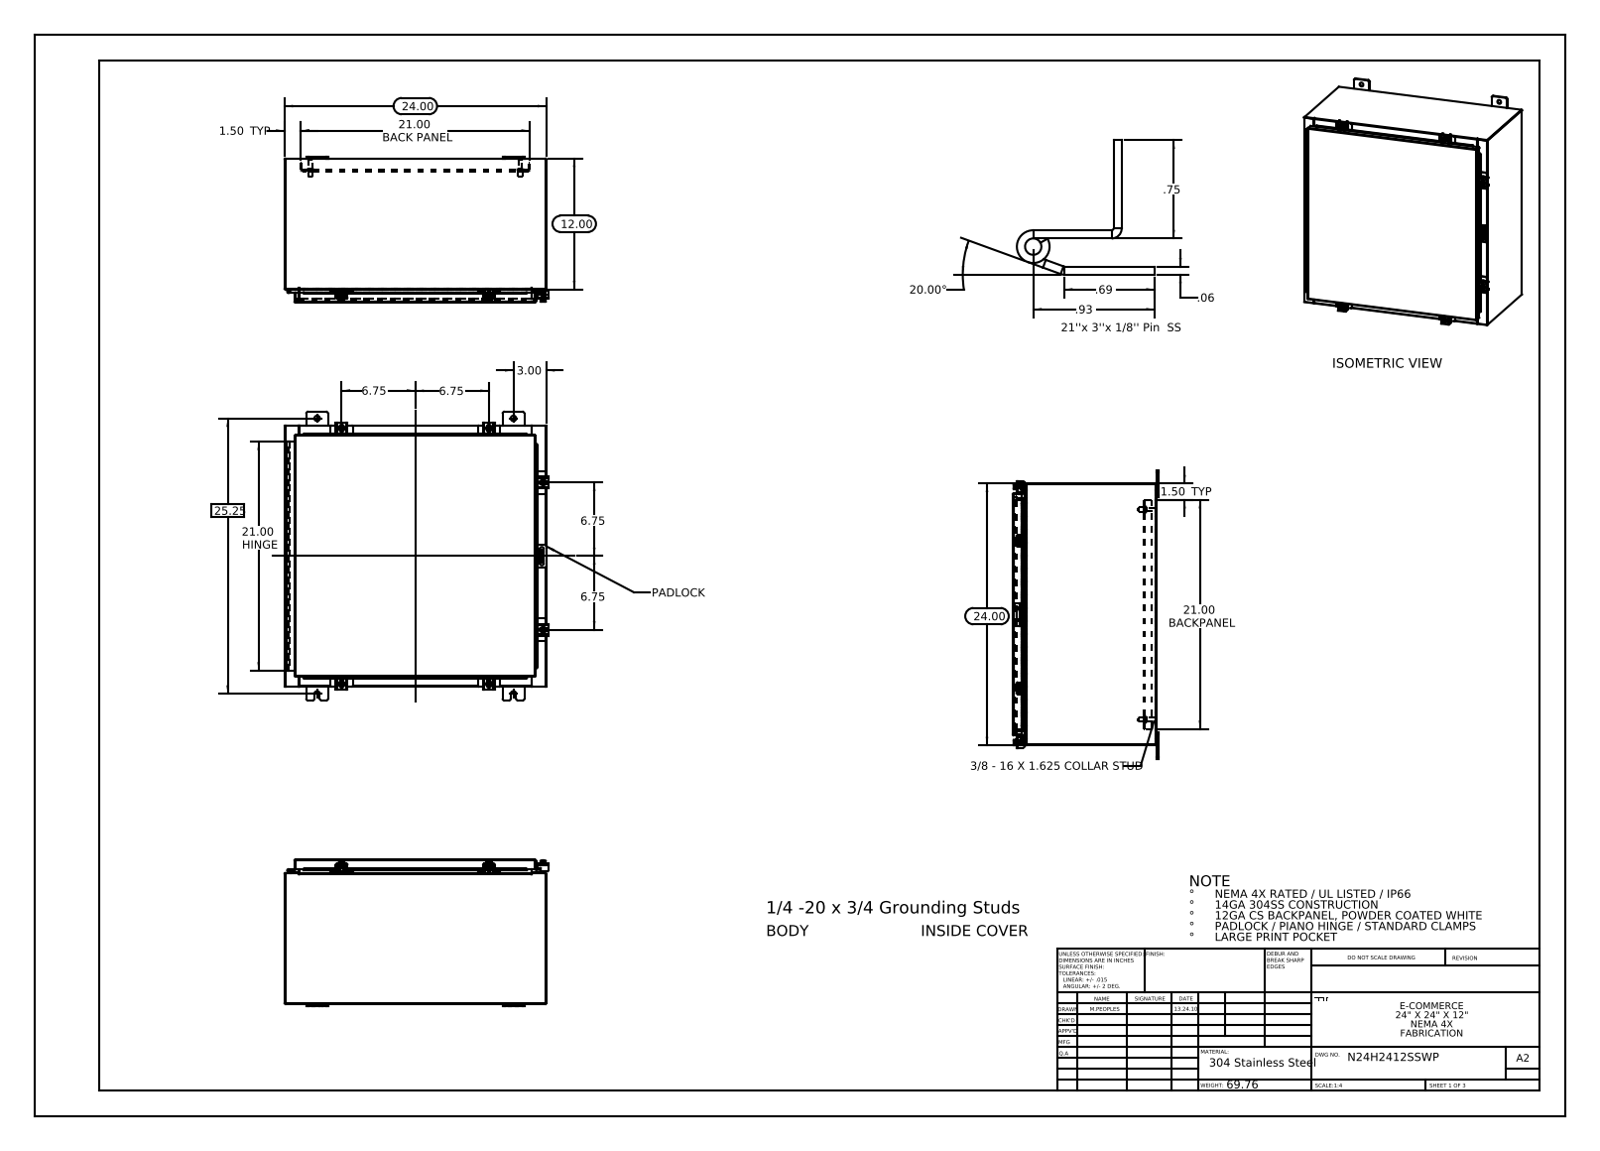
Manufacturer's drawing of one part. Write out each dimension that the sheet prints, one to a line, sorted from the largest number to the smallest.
25.25
24.00
24.00
21.00 HINGE
21.00 BACK PANEL
21.00 BACKPANEL
20.00°
12.00
6.75
6.75
6.75
6.75
3.00
1.50 TYP
1.50 TYP
.93
.75
.69
.06
